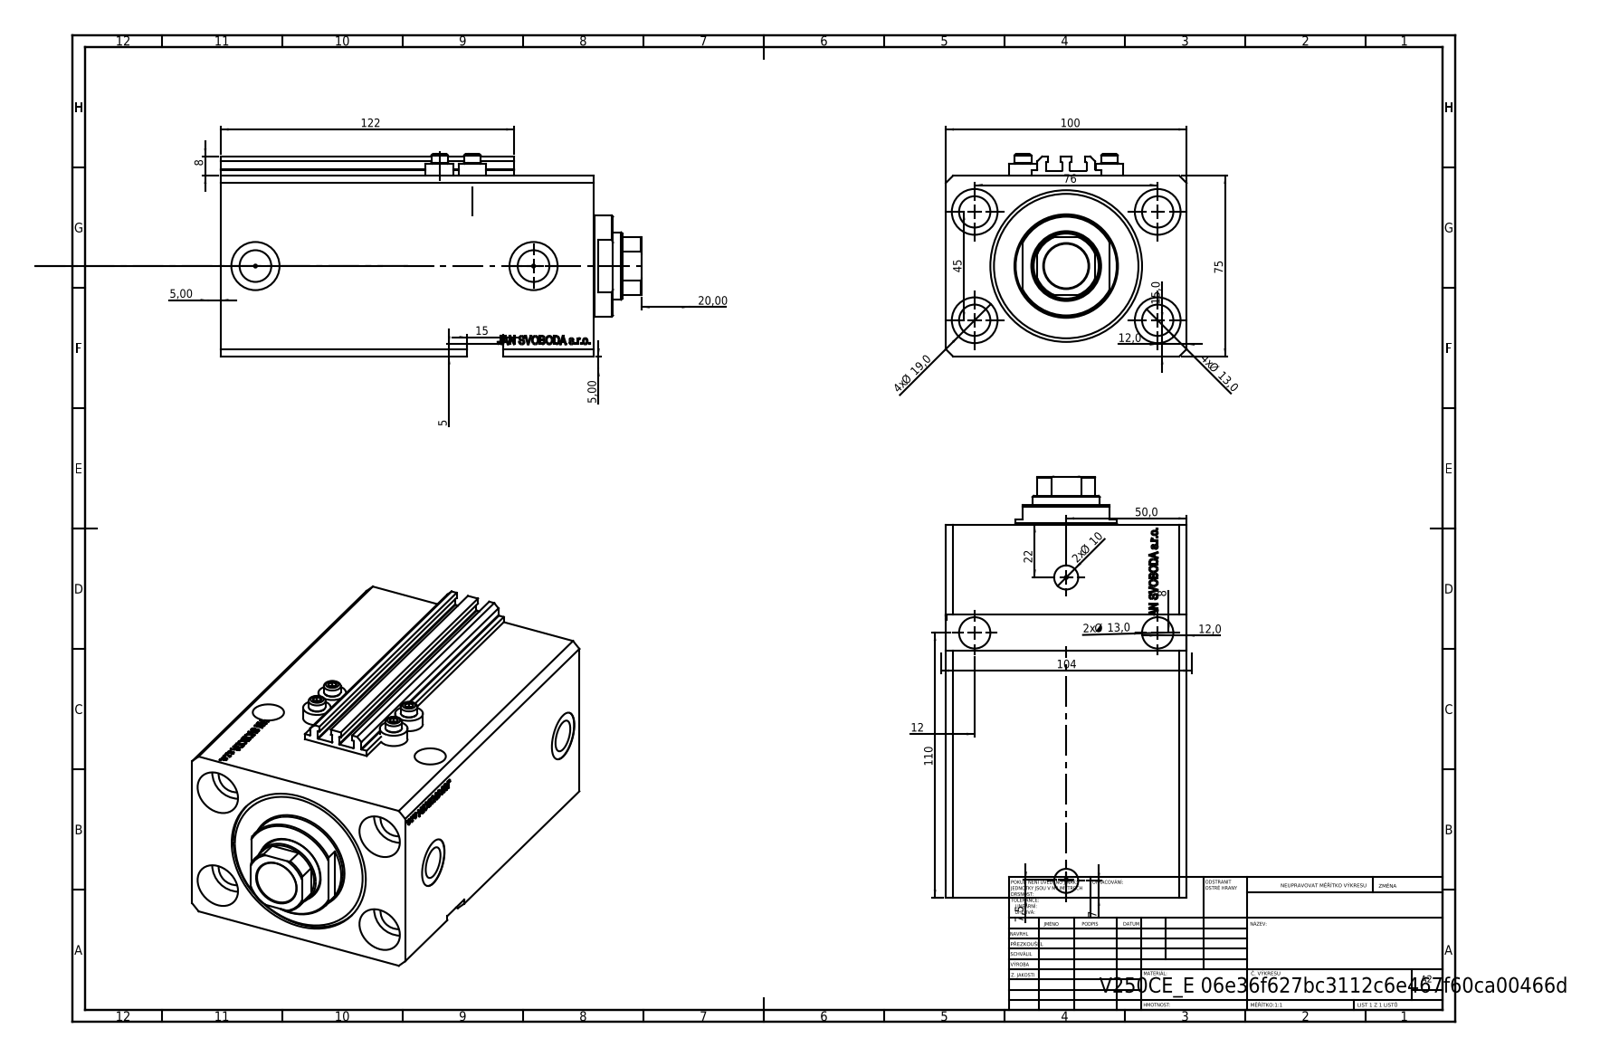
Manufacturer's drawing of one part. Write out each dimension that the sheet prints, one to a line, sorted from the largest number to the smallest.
122
110
104
100
76
75
50,0
45
22
20,00
4x Ø 19,0
15,0
15
4x Ø 13,0
2x Ø 13,0
12,0
12,0
12
2x Ø 10
8
8
7,5
7
5,00
5,00
5
